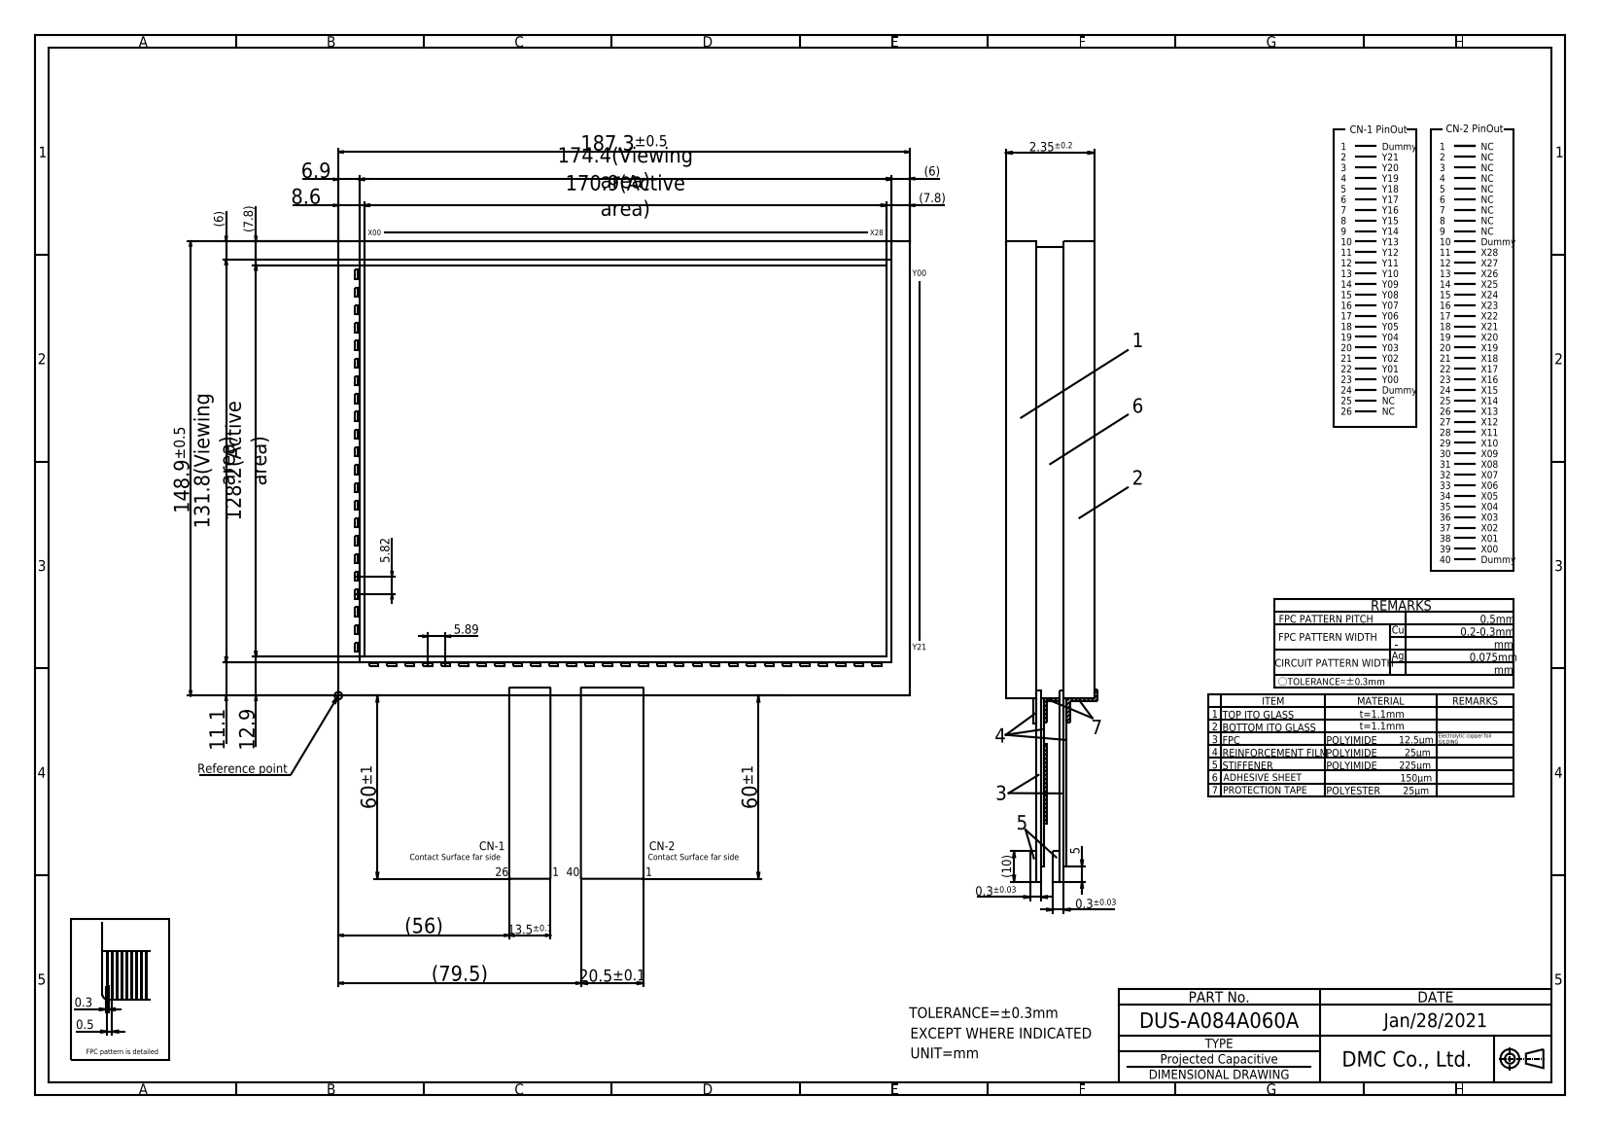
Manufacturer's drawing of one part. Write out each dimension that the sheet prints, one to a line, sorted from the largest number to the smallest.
187.3±0.5
174.4(Viewing area)
170.9(Active area)
148.9±0.5
131.8(Viewing area)
128.2(Active area)
(79.5)
60±1
60±1
(56)
20.5±0.1
13.5±0.1
12.9
11.1
(10)
8.6
(7.8)
(7.8)
6.9
(6)
(6)
5.89
5.82
5
2.35±0.2
0.5
0.3
0.3±0.03
0.3±0.03
